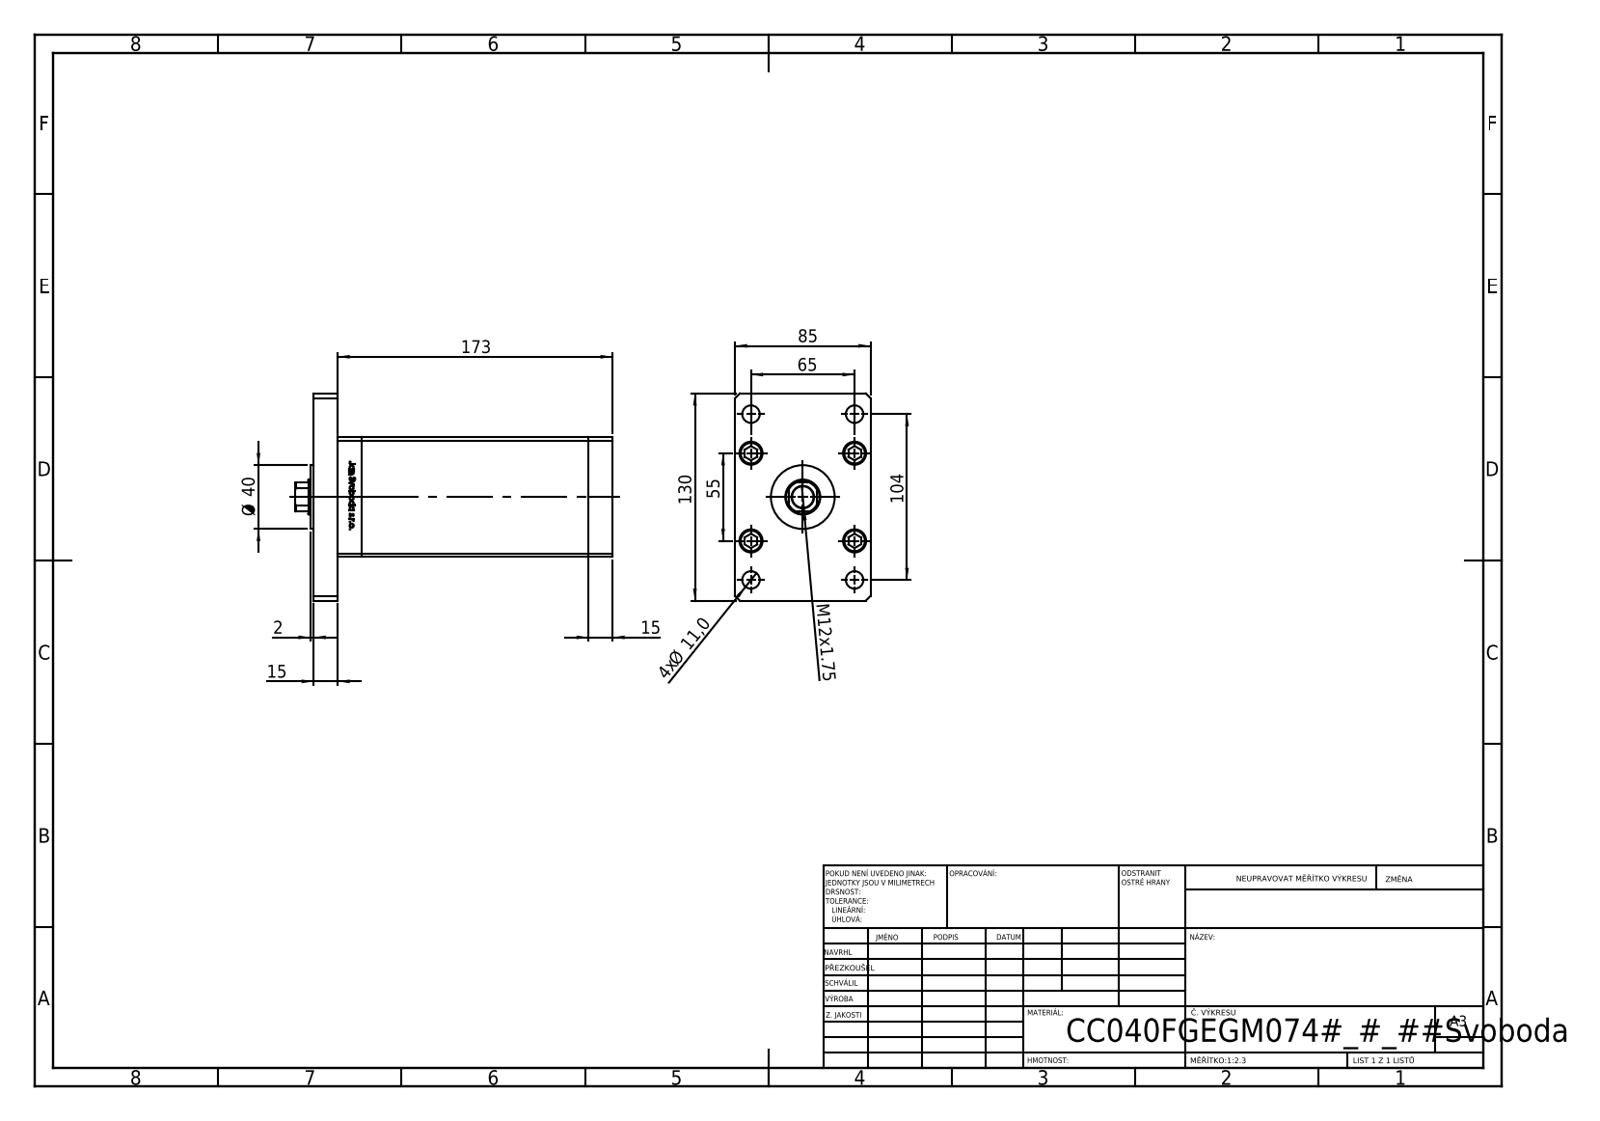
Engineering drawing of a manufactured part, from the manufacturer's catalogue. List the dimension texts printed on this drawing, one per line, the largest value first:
173
130
104
85
65
55
Ø 40
15
15
M12x1.75
4x Ø 11,0
2
